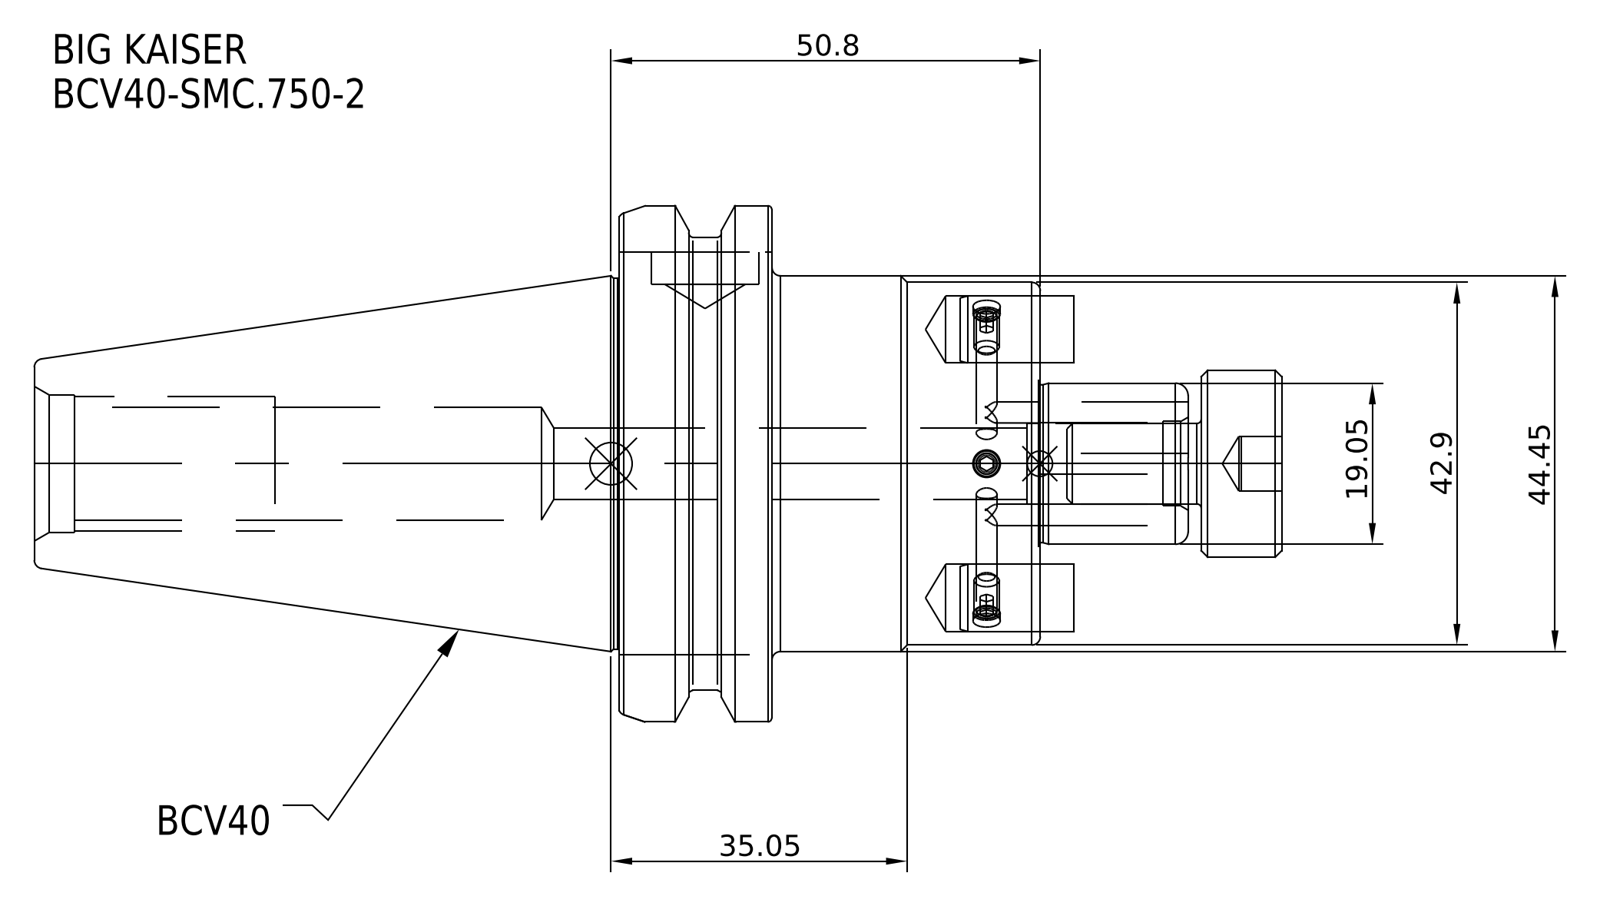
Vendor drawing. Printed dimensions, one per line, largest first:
50.8
44.45
42.9
35.05
19.05
